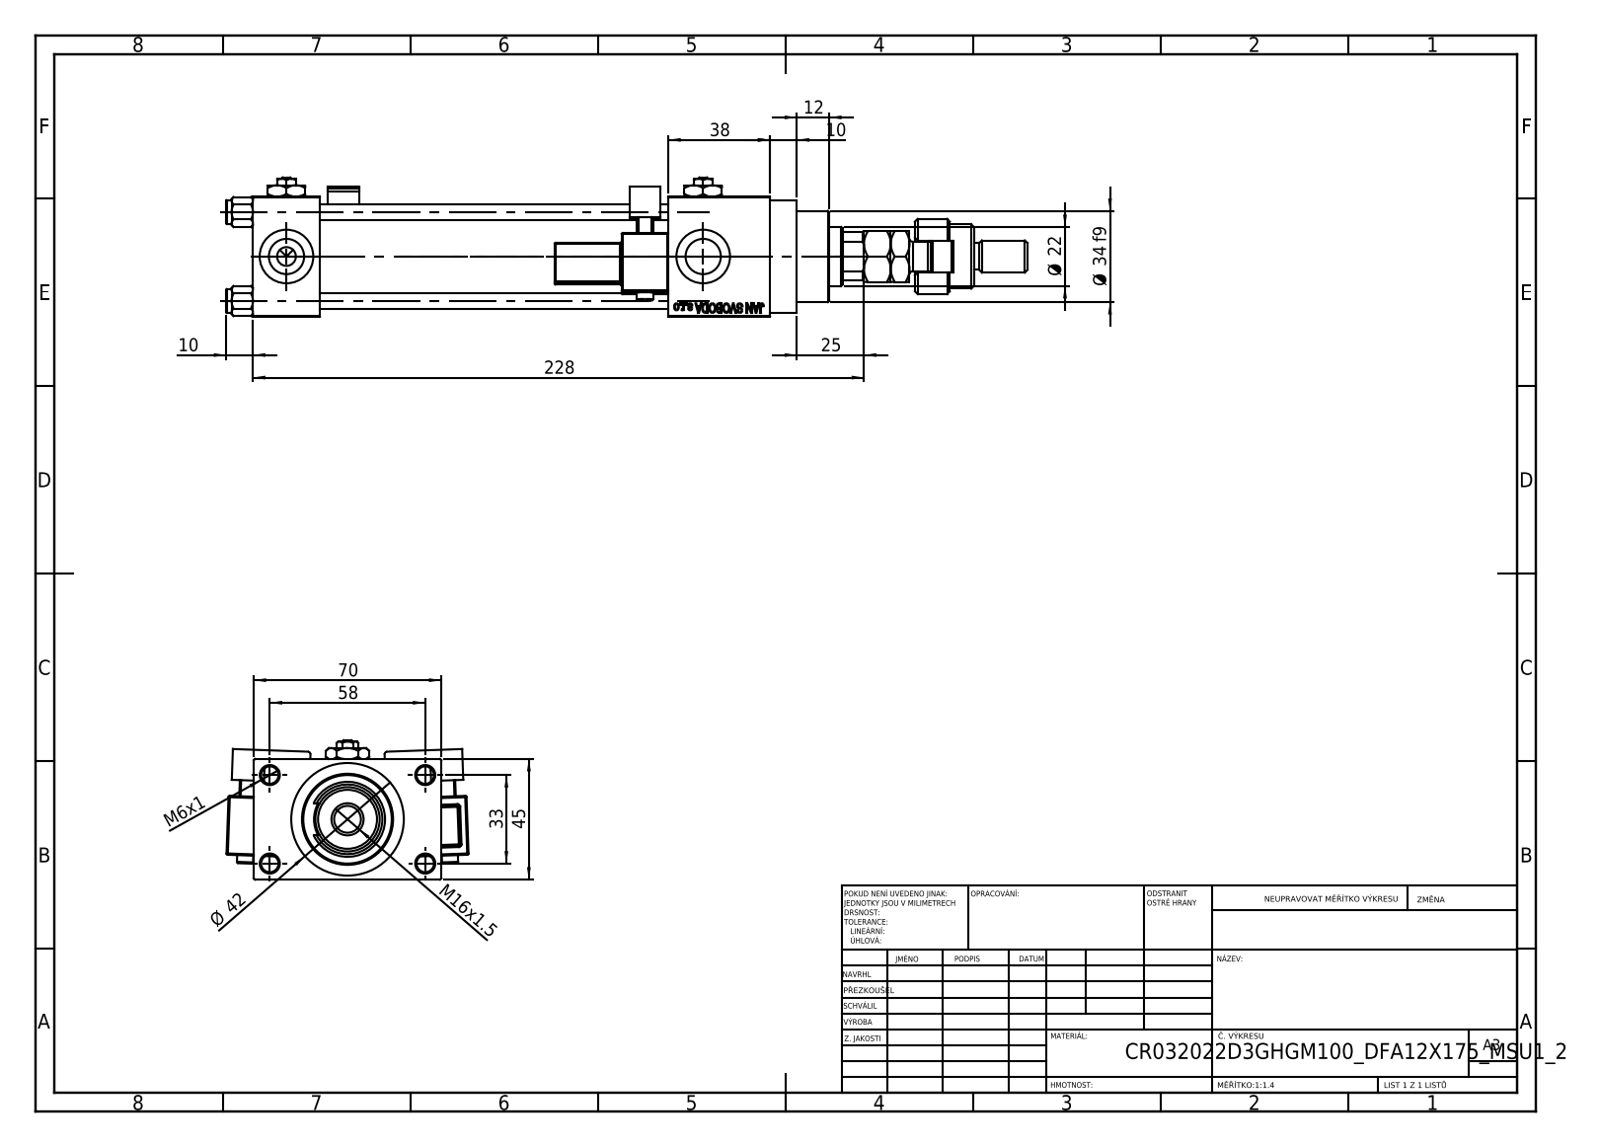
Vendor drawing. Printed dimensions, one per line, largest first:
228
70
58
45
Ø 42
38
Ø 34 f9
33
25
Ø 22
M16x1.5
12
10
10
M6x1
